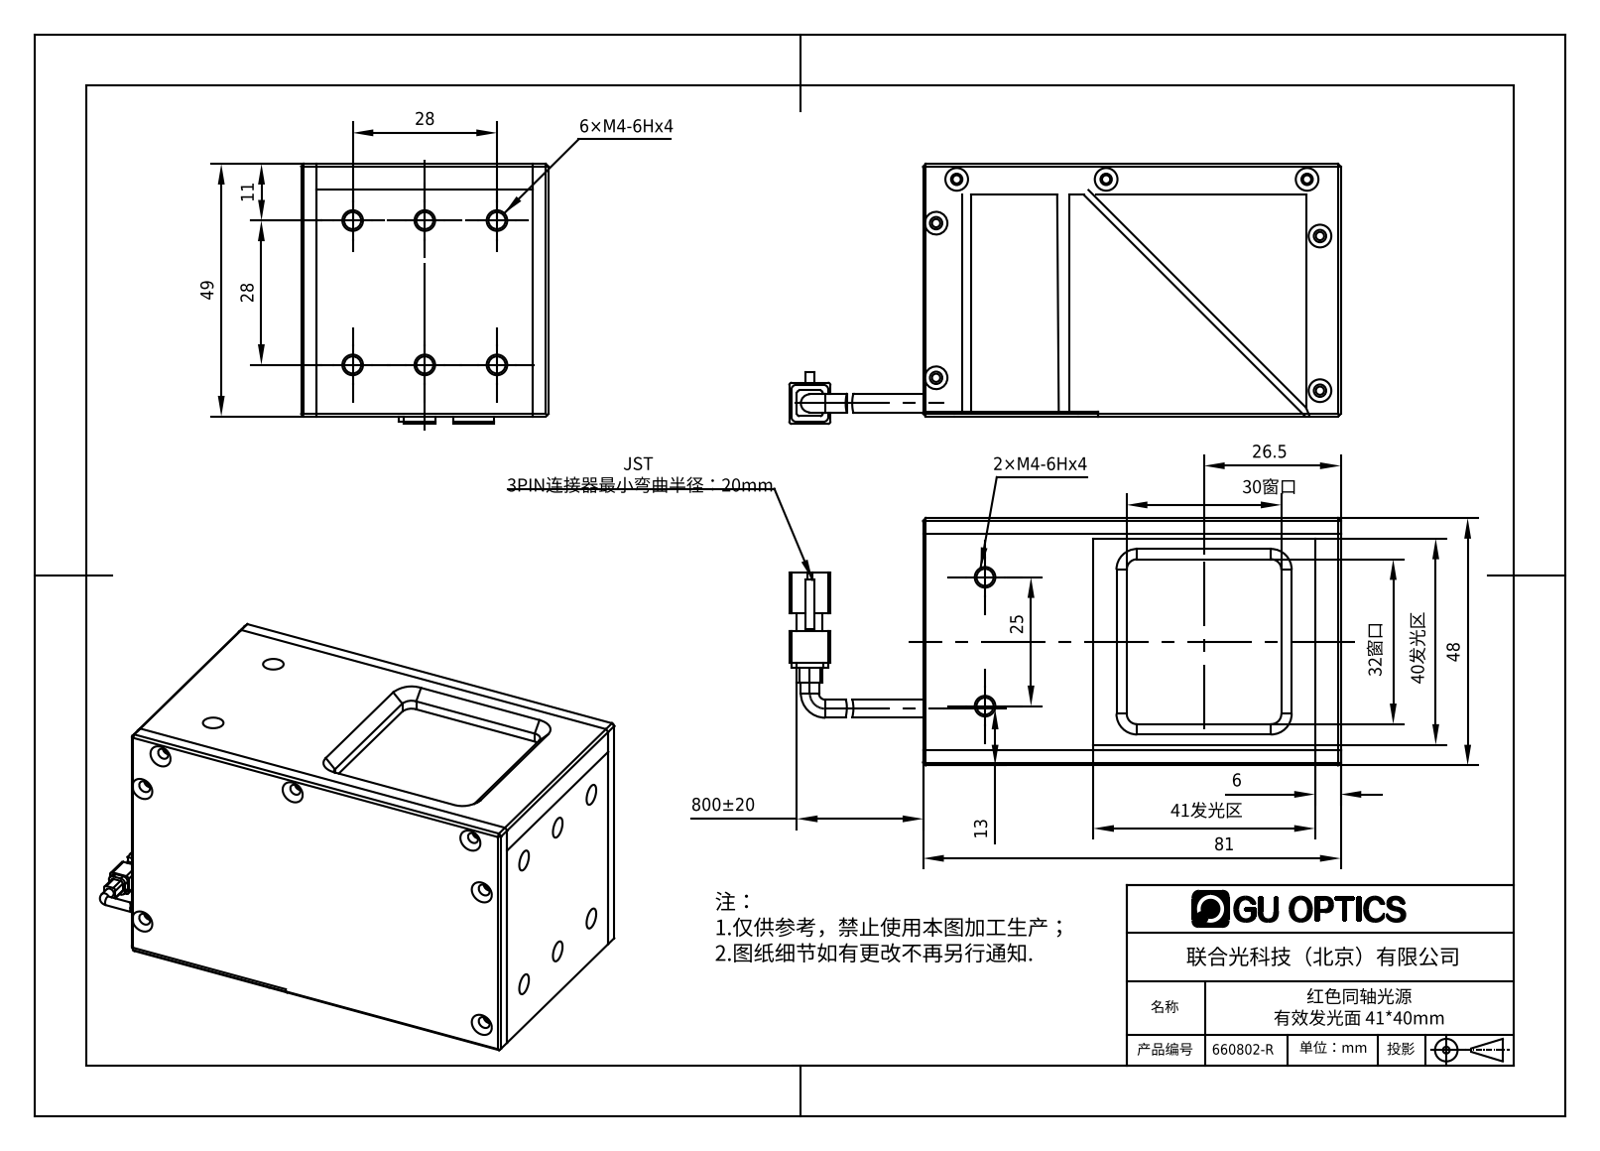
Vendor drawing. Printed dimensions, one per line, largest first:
800±20
81
49
48
41发光区
40发光区
32窗口
30窗口
28
28
26.5
25
13
11
6
